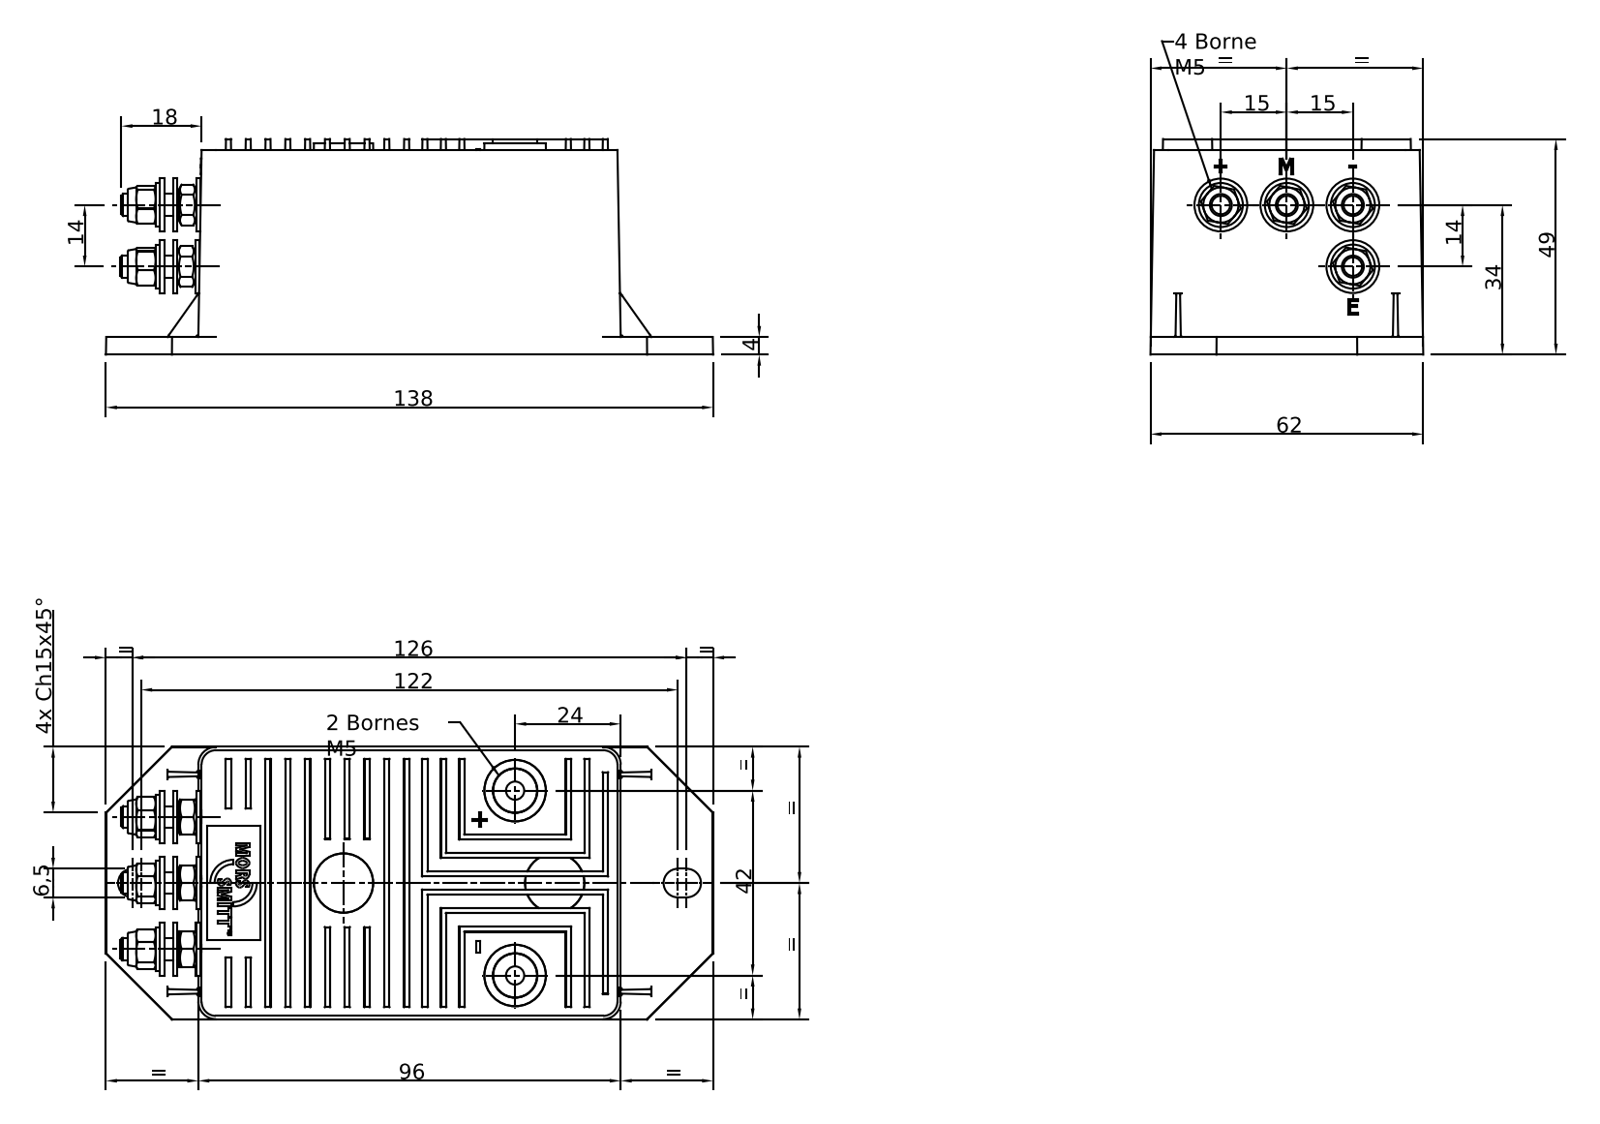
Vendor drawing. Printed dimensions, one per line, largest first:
138
126
122
96
62
49
42
34
24
18
15
15
4x Ch15x45°
14
14
6,5
4
=
=
=
=
=
=
=
=
=
=
